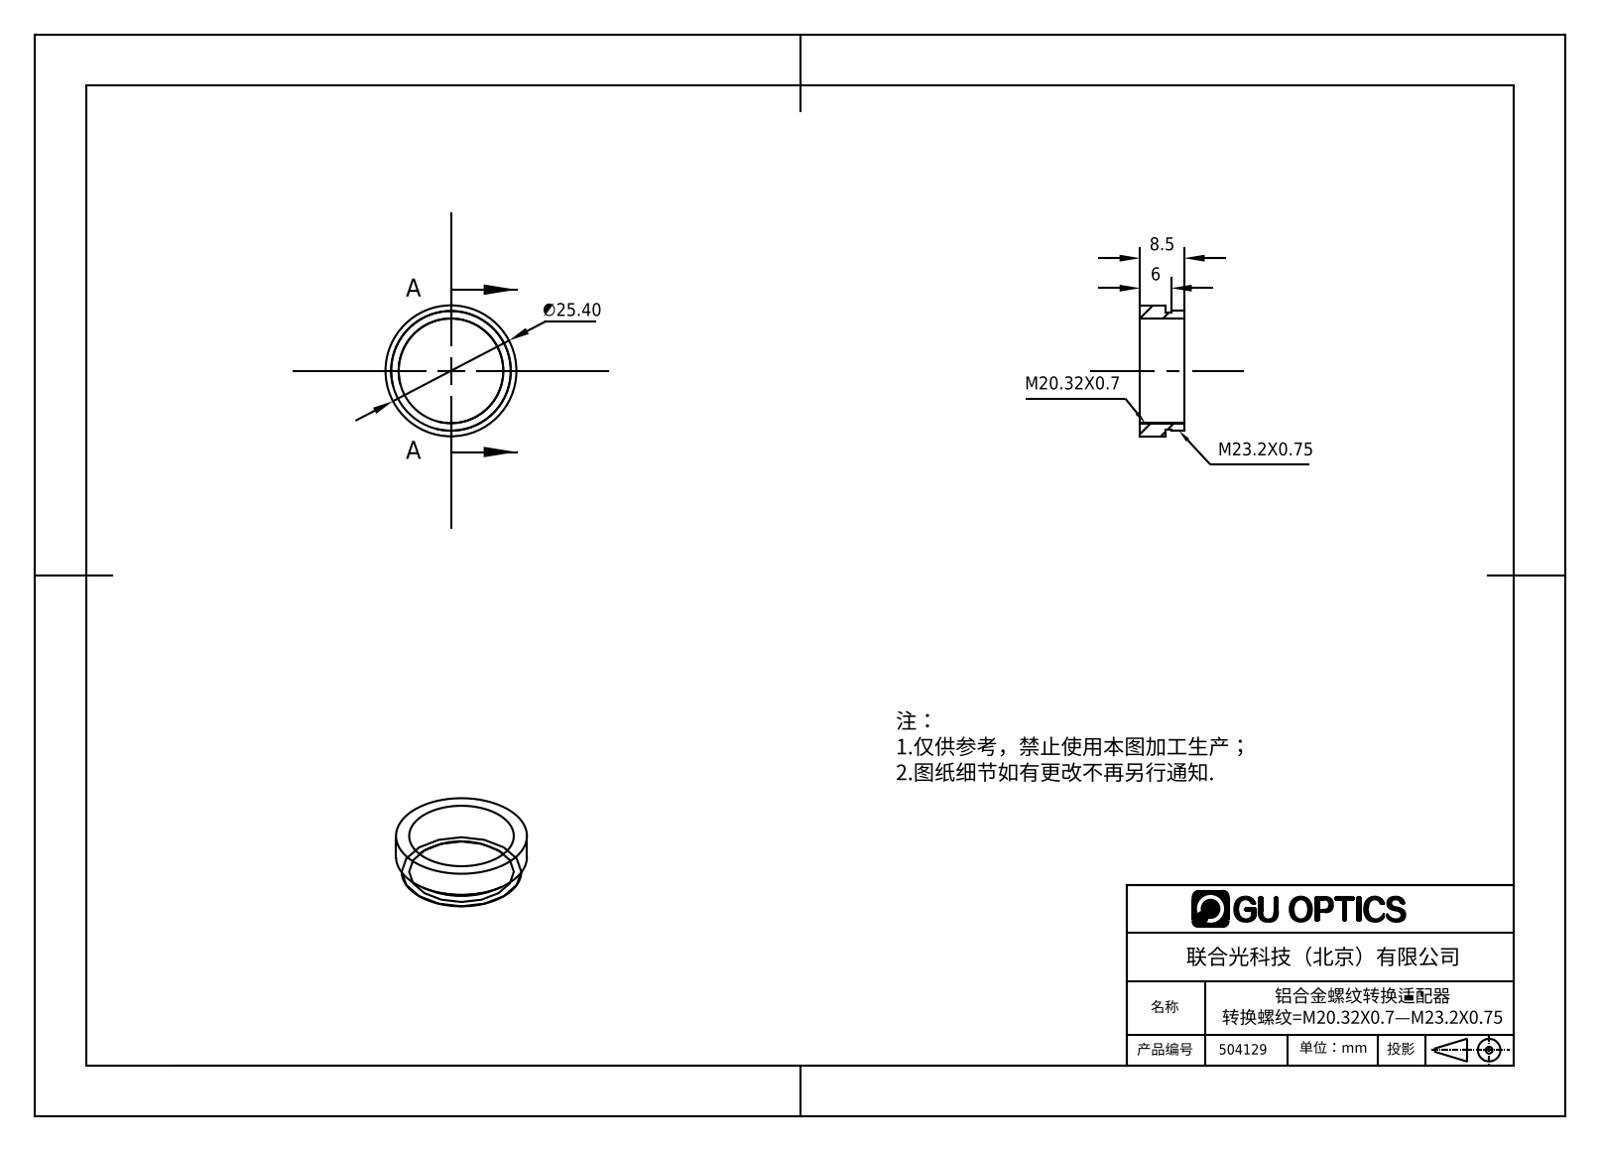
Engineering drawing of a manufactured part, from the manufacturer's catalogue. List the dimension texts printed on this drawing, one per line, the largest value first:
∅25.40
8.5
6
